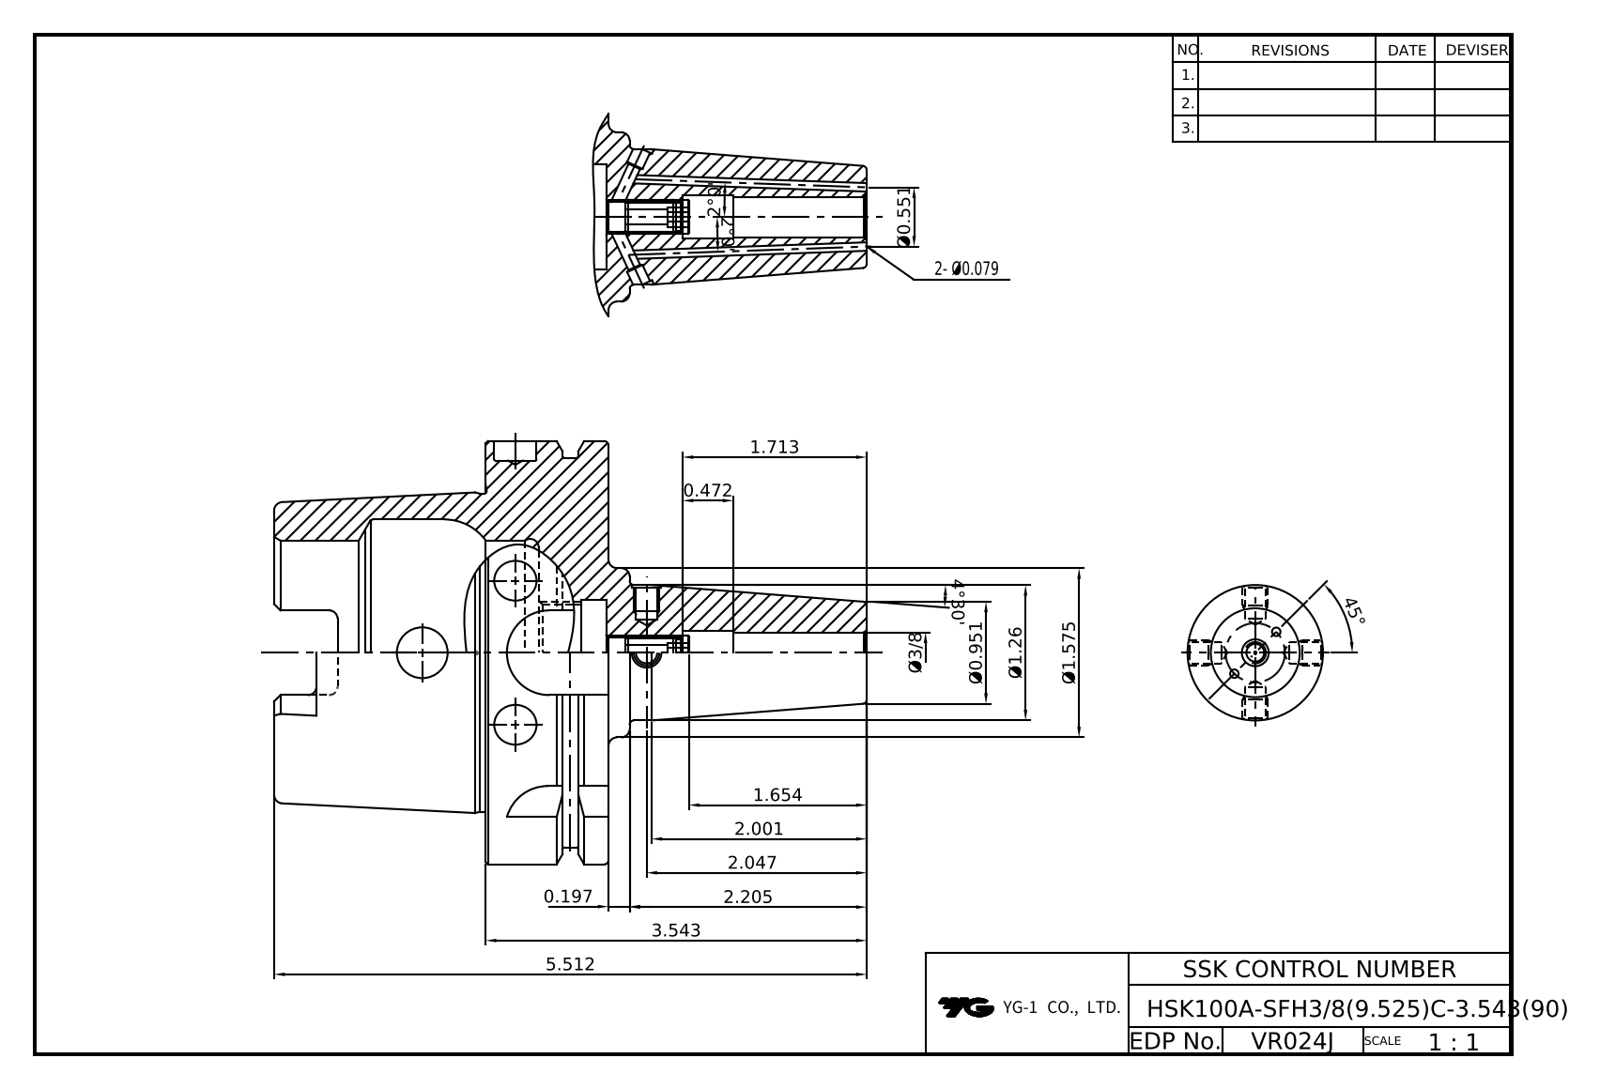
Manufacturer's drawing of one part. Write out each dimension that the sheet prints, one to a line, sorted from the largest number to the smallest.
45°
5.512
3.543
2.205
2.047
2.001
2°0'
2°0'
1.713
1.654
Ø1.575
Ø1.26
Ø0.951
Ø0.551
0.472
0.197
